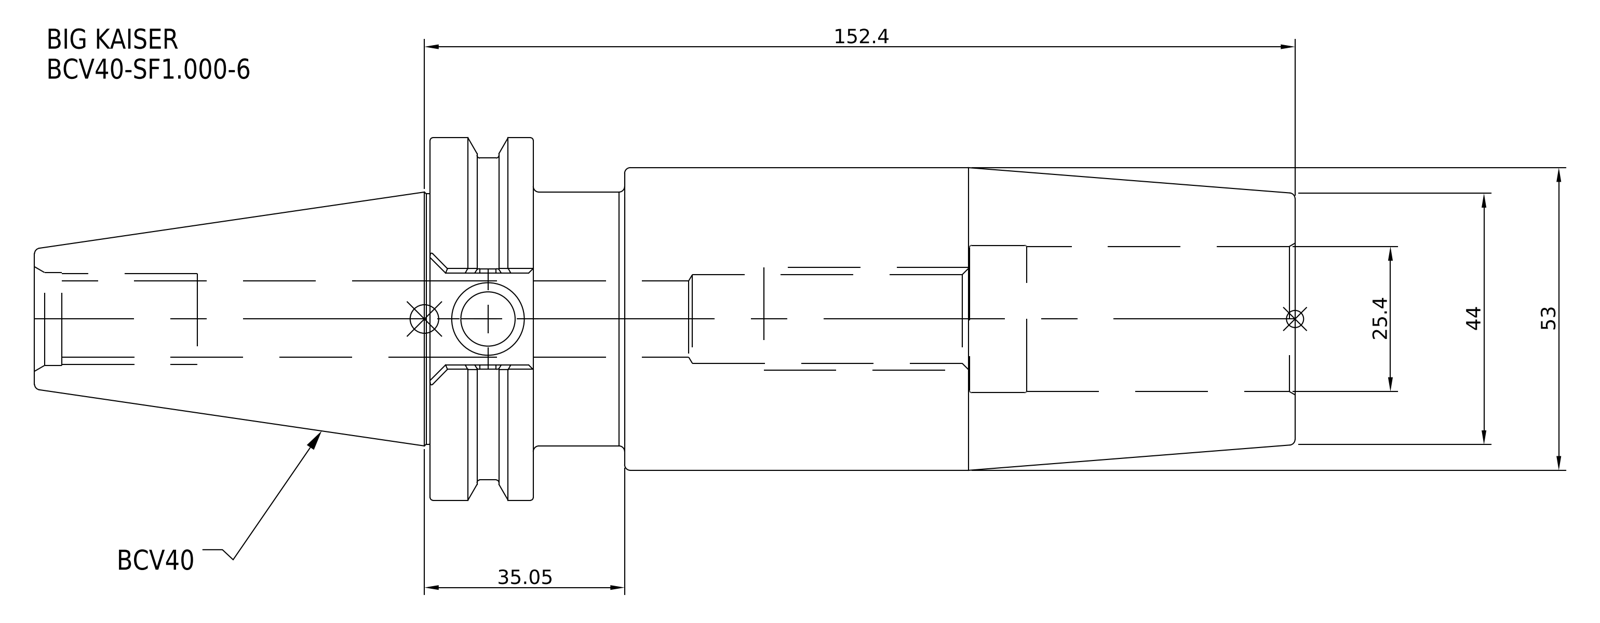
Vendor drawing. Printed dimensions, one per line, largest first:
152.4
53
44
35.05
25.4
